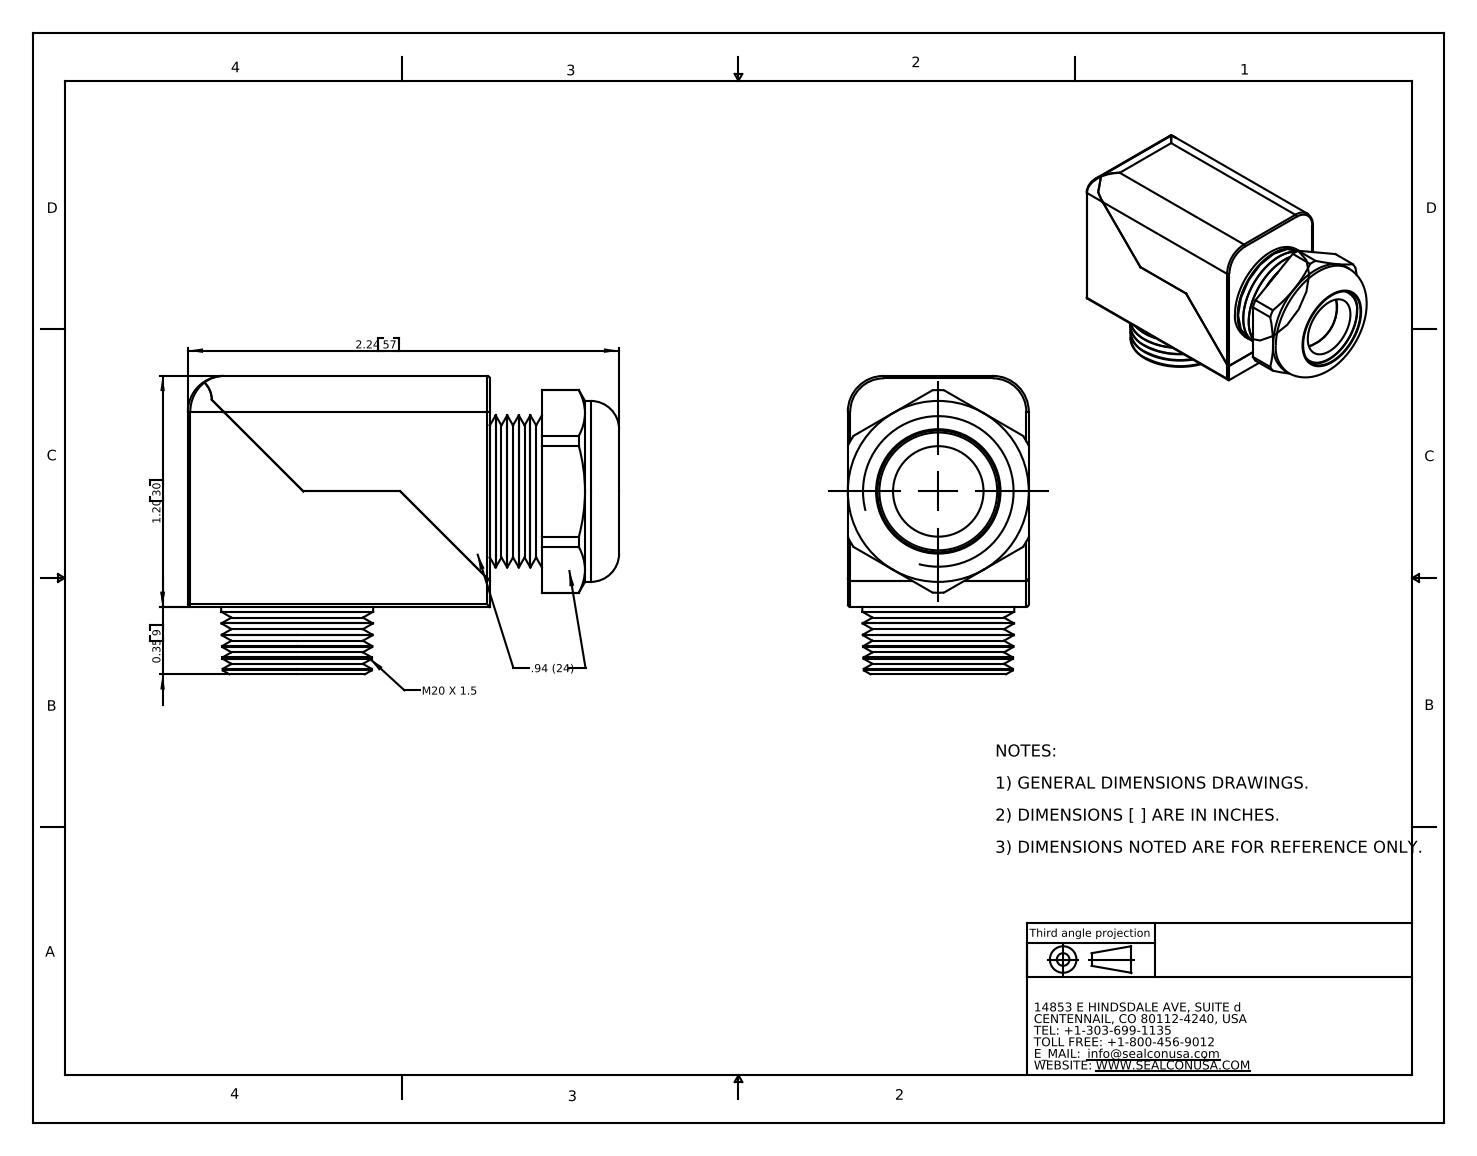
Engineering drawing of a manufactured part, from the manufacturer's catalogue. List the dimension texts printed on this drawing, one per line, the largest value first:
2.24 57
1.20 30
0.35 9
